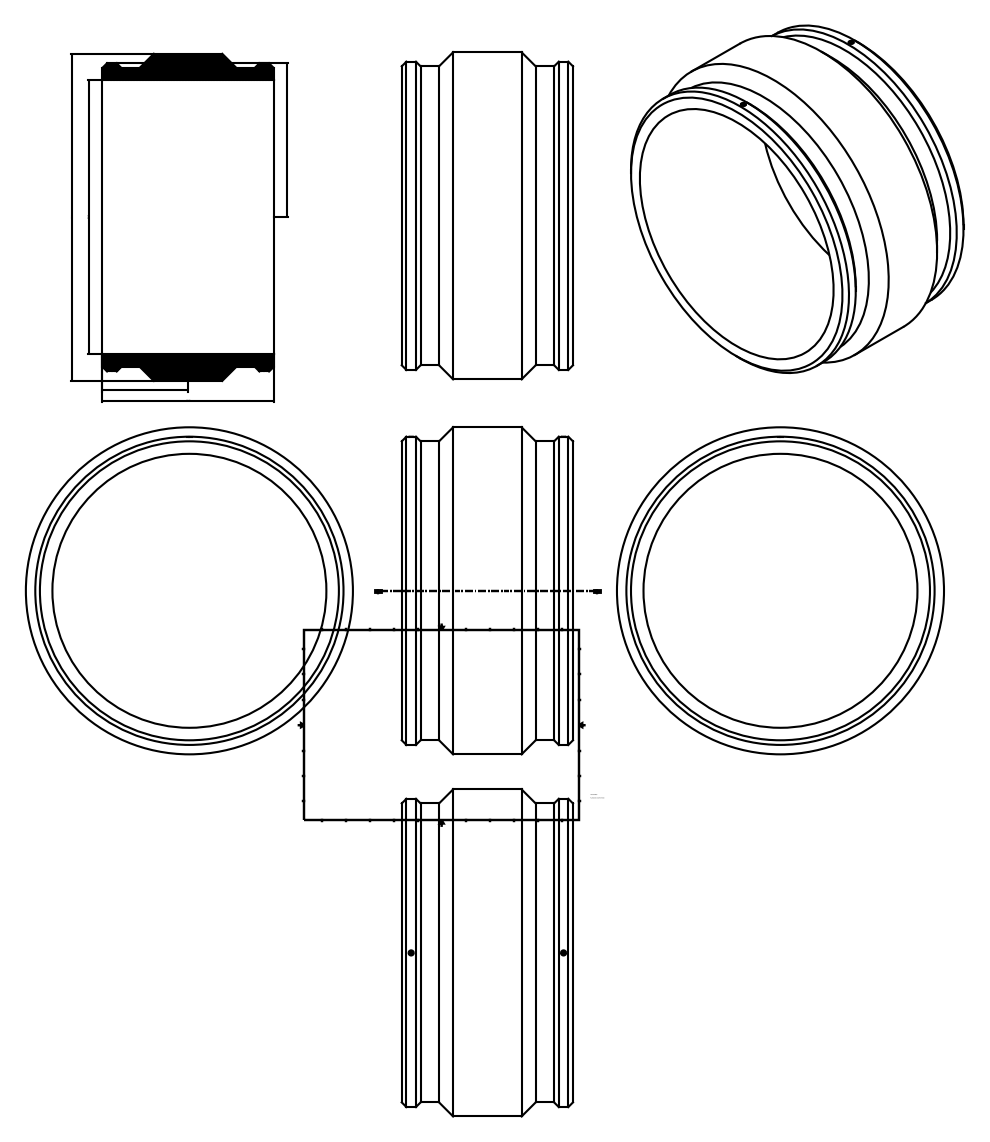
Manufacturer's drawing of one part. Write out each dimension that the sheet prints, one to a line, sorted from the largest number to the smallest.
955,00
800,00
500,00
450,00
250,00
